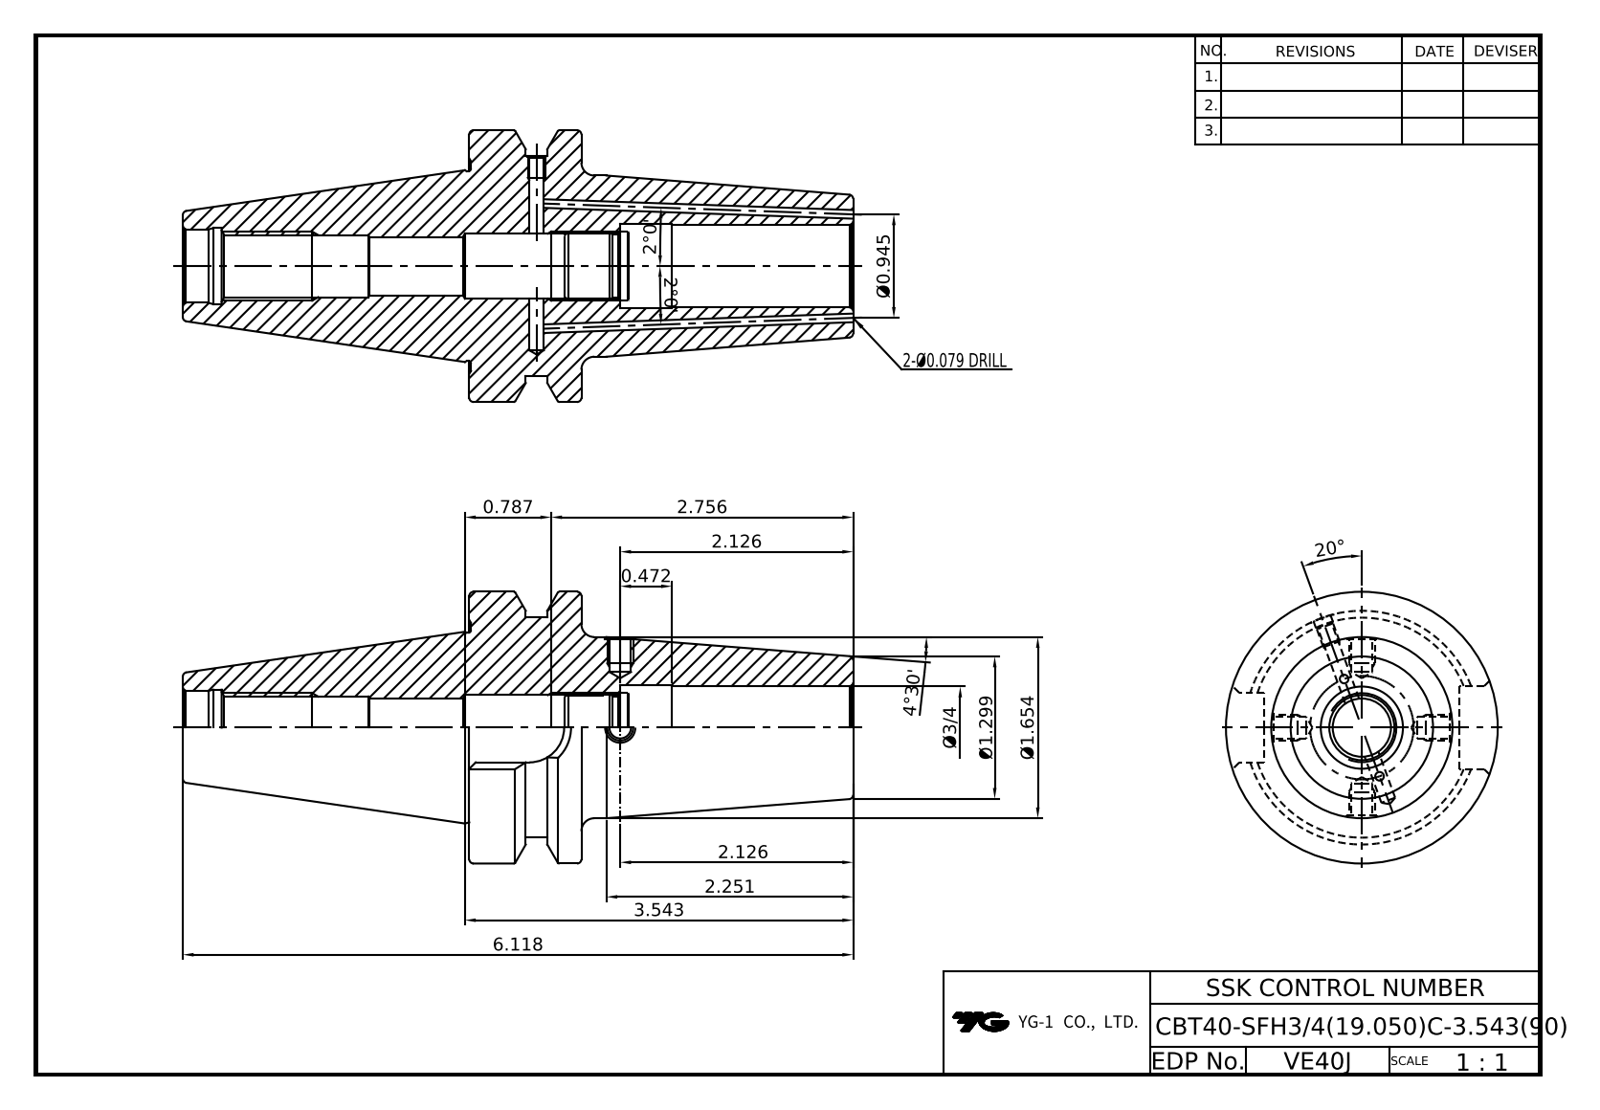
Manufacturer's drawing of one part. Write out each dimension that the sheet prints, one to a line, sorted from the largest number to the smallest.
20°
6.118
4°30'
3.543
2.756
2.251
2.126
2.126
2°0'
2°0'
Ø1.654
Ø1.299
Ø0.945
0.787
0.472
